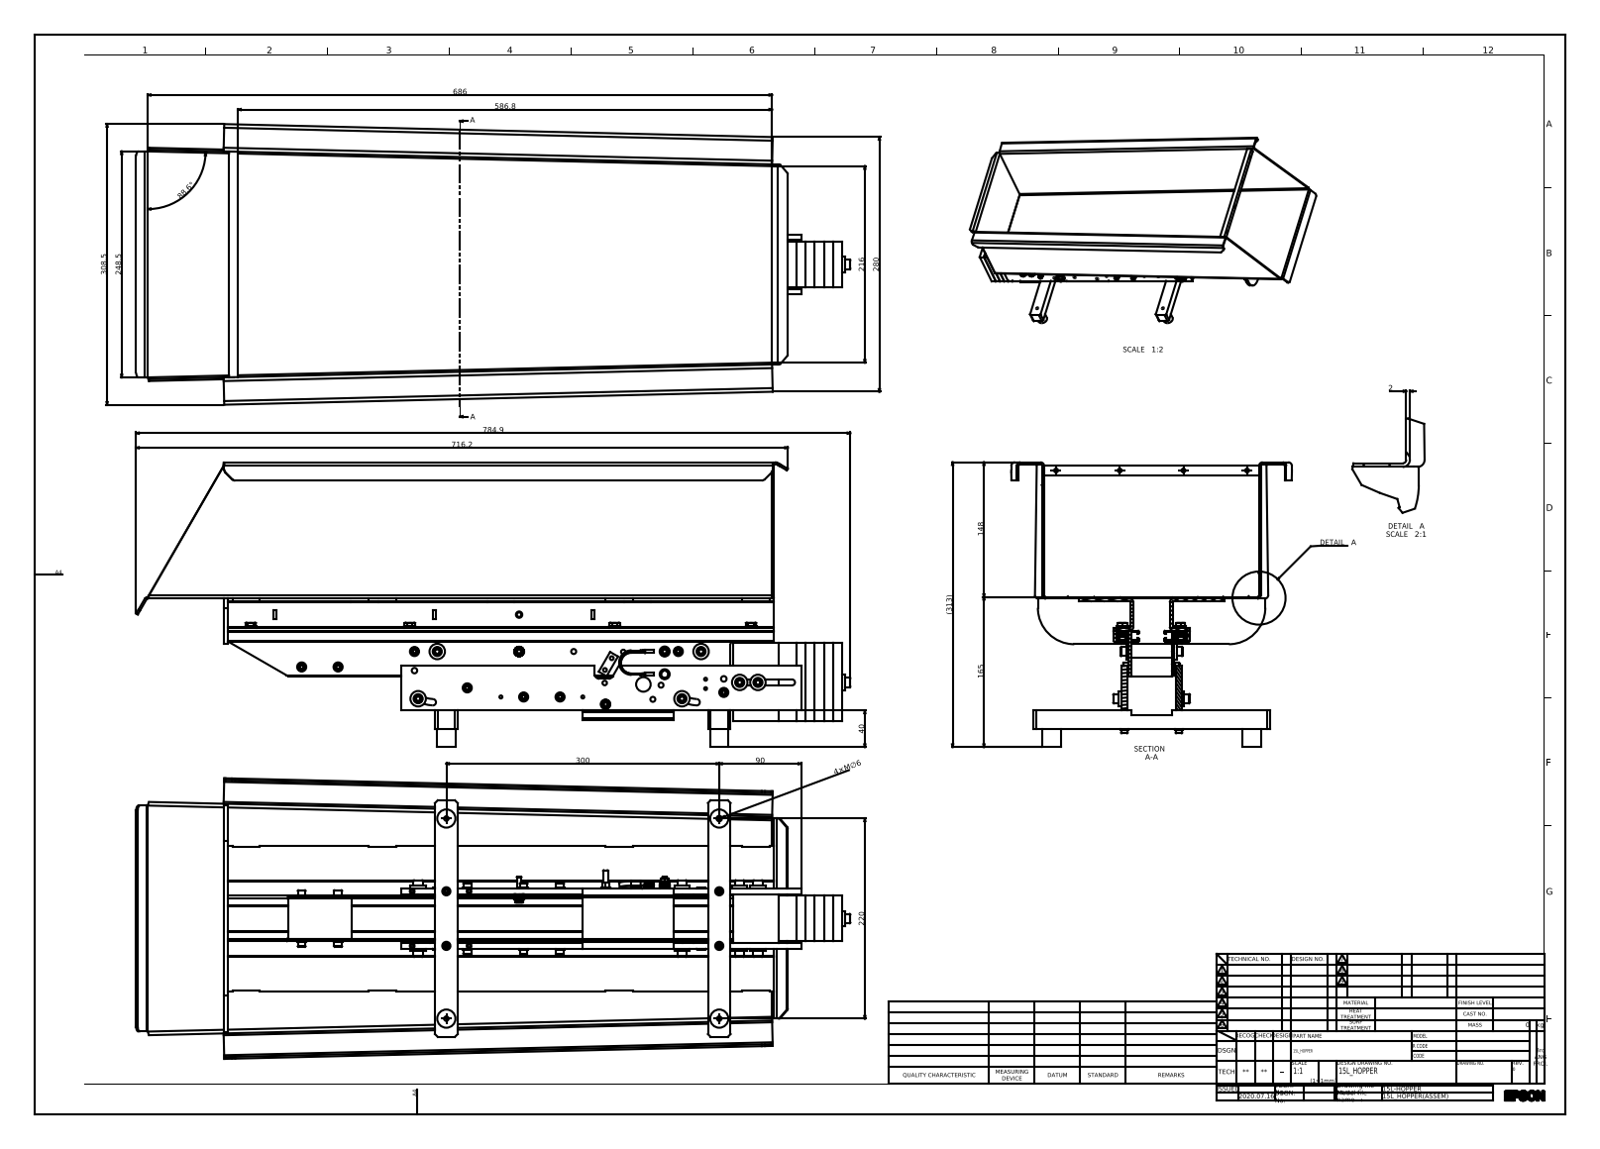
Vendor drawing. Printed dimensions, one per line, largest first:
784.9
716.2
686
586.8
(313)
308.5
300
280
248.5
220
216
165
148
90
88.6°
40
4×M∅6
2
